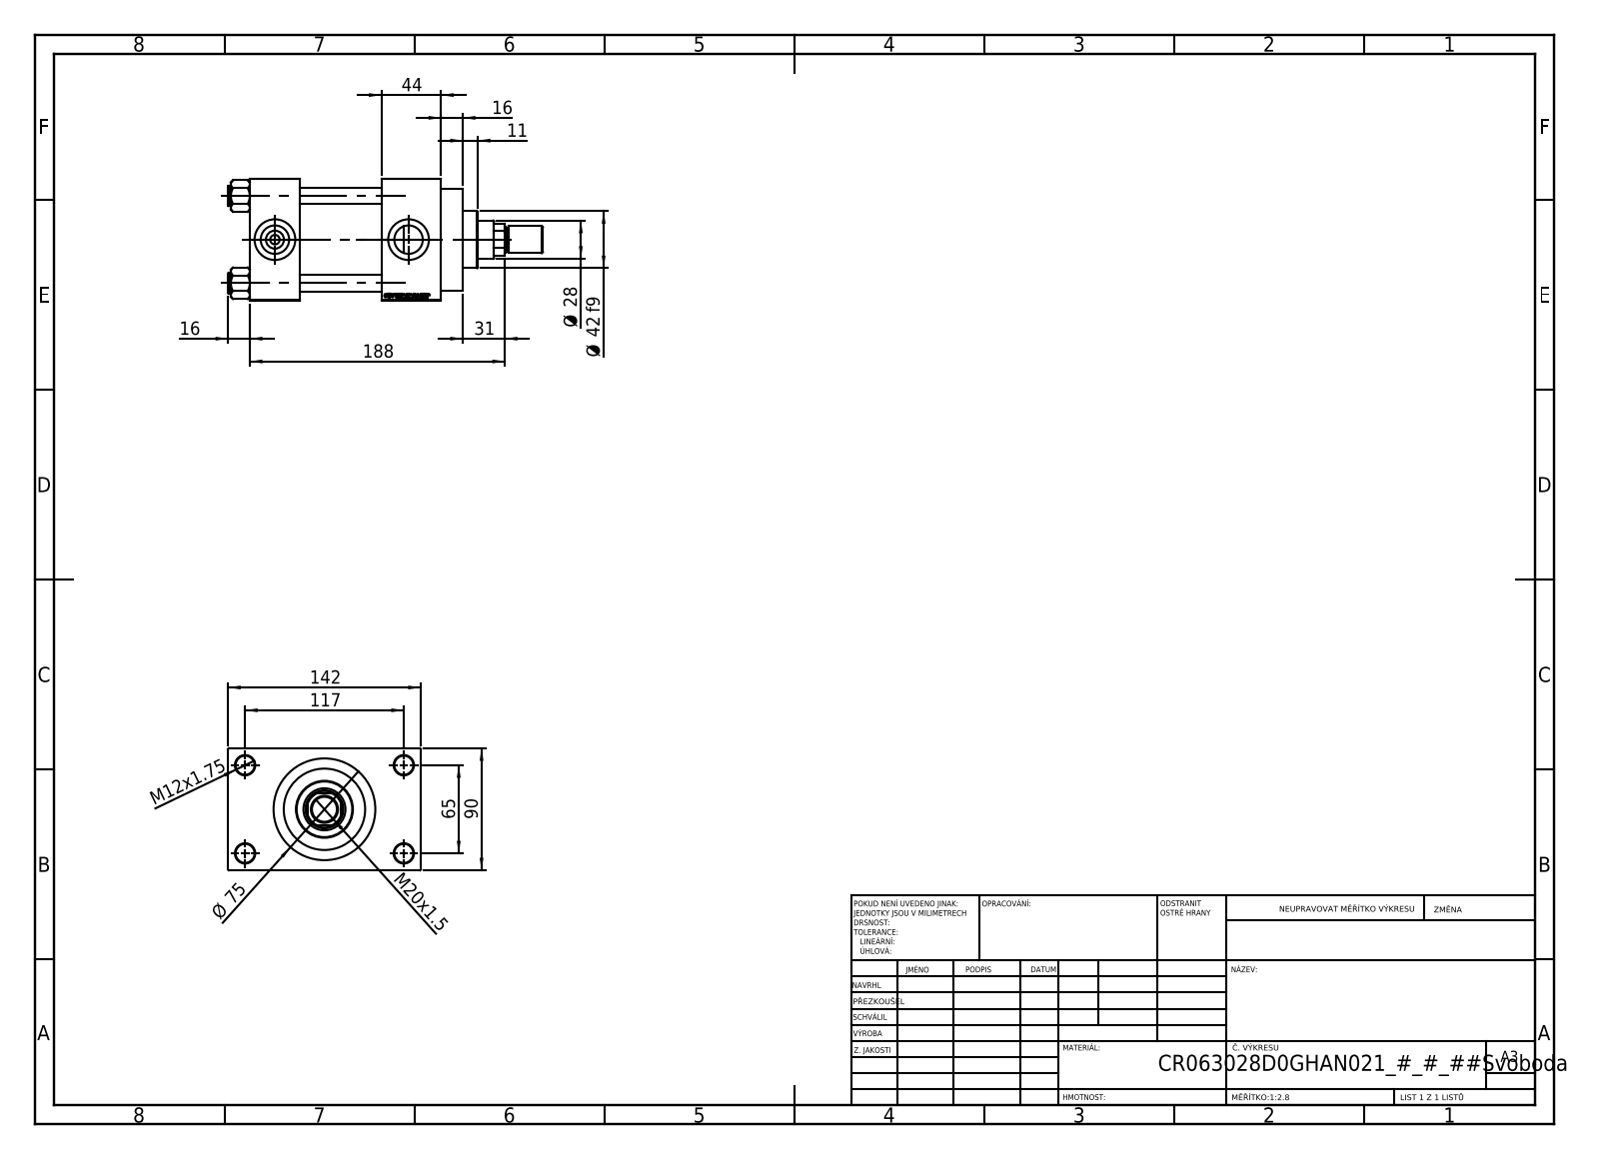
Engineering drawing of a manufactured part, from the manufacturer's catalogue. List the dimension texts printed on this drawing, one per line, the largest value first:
188
142
117
90
Ø 75
65
44
Ø 42 f9
31
Ø 28
M20x1.5
16
16
M12x1.75
11
